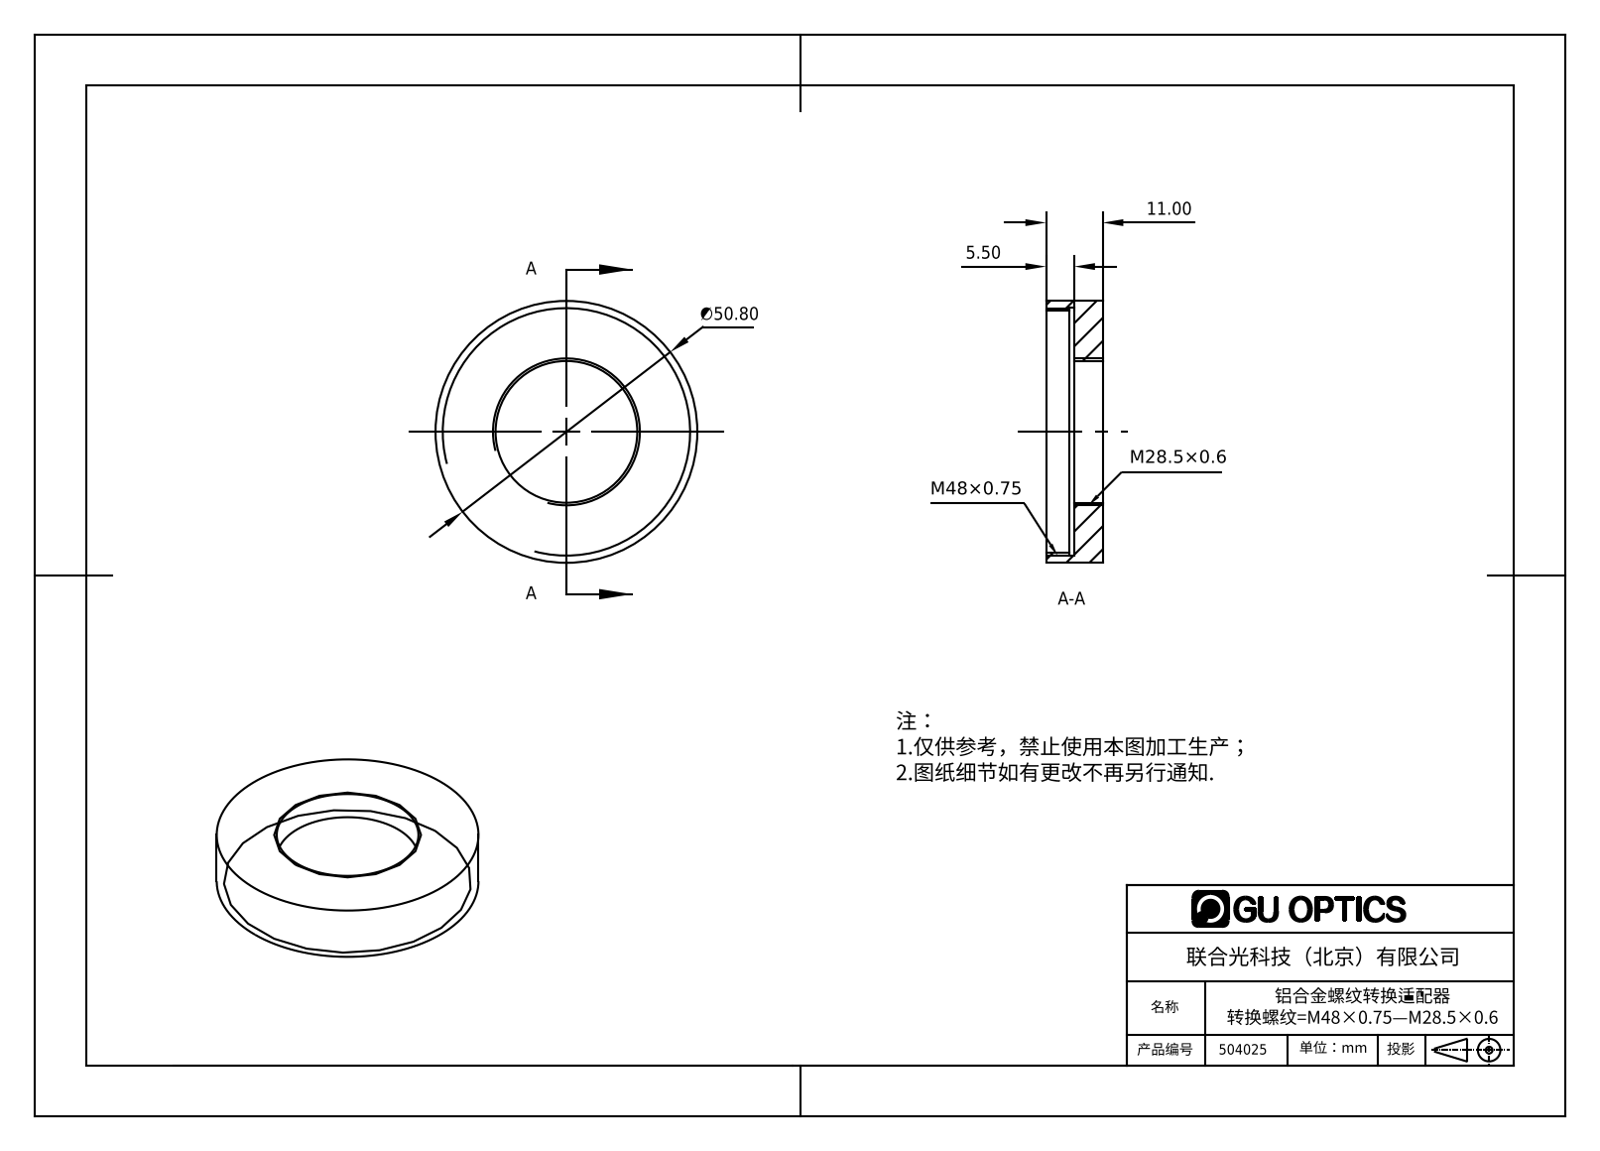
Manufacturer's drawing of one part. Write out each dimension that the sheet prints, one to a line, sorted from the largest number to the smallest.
∅50.80
11.00
5.50
